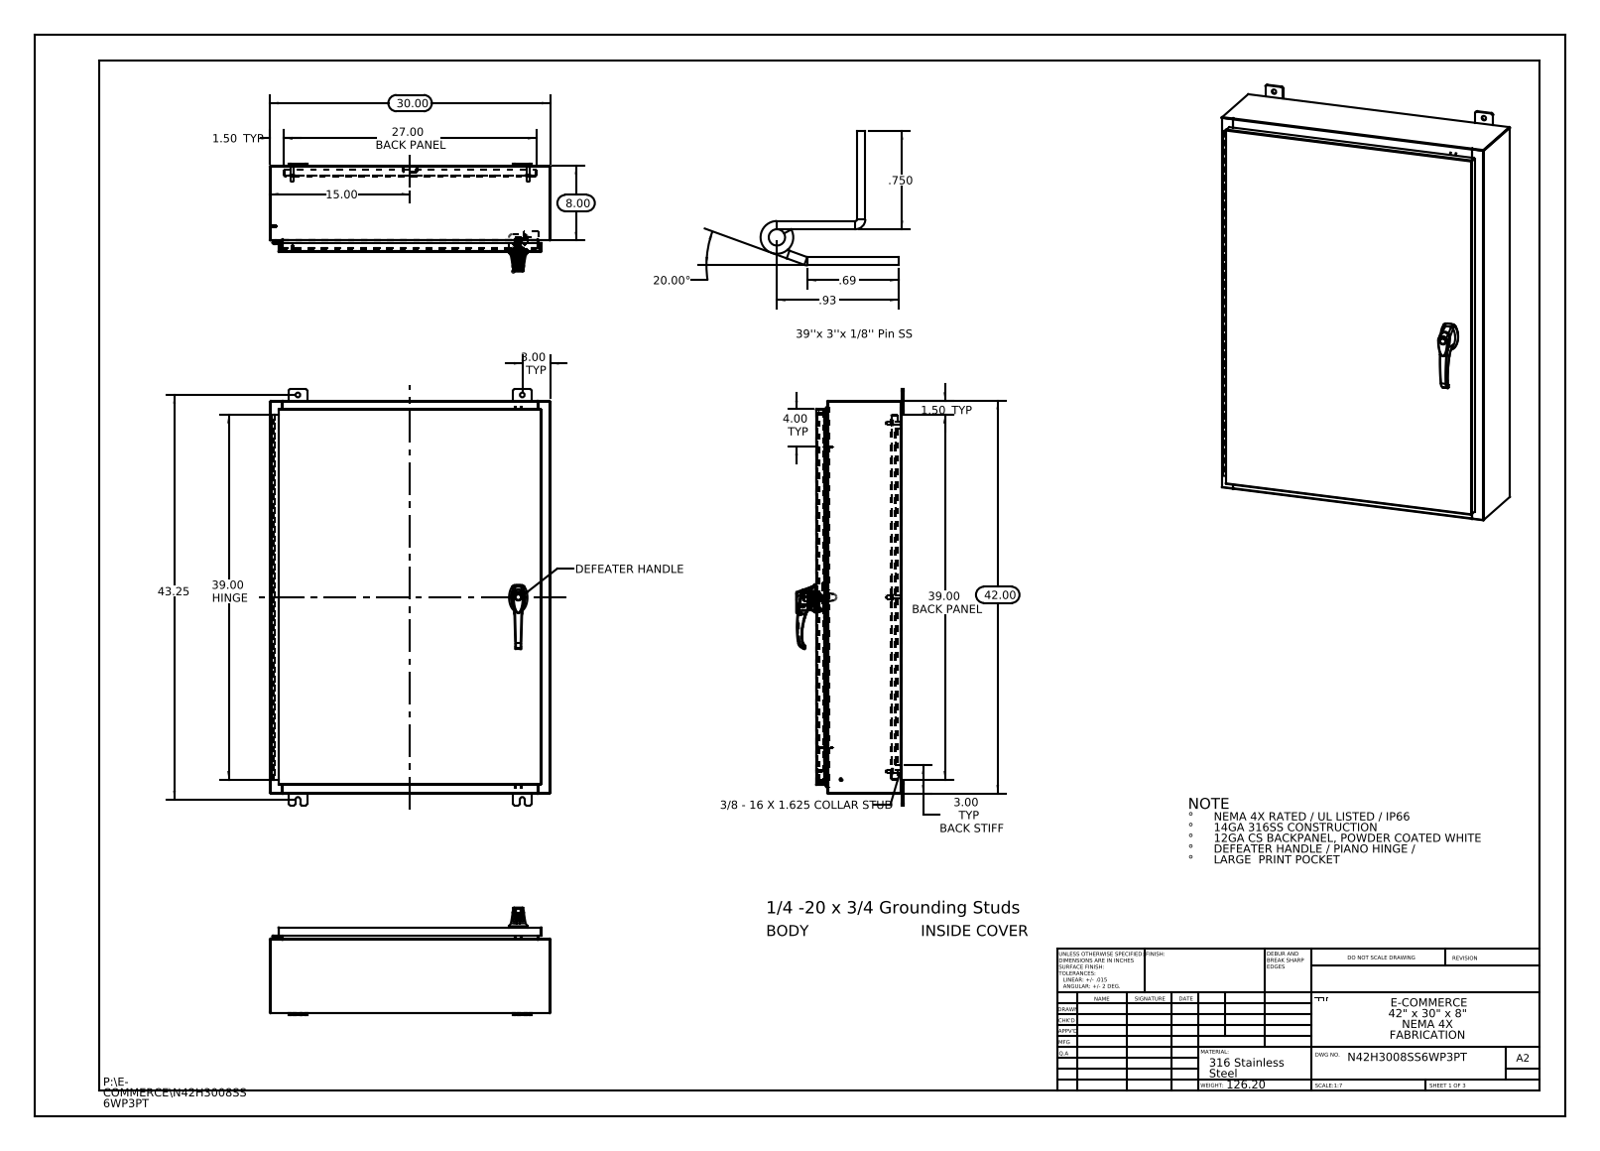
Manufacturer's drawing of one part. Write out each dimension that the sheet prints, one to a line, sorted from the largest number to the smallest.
43.25
42.00
39.00 HINGE
39.00 BACK PANEL
30.00
27.00 BACK PANEL
20.00°
15.00
8.00
4.00 TYP
3.00 TYP
3.00 TYP BACK STIFF
1.50 TYP
1.50 TYP
.93
.750
.69
